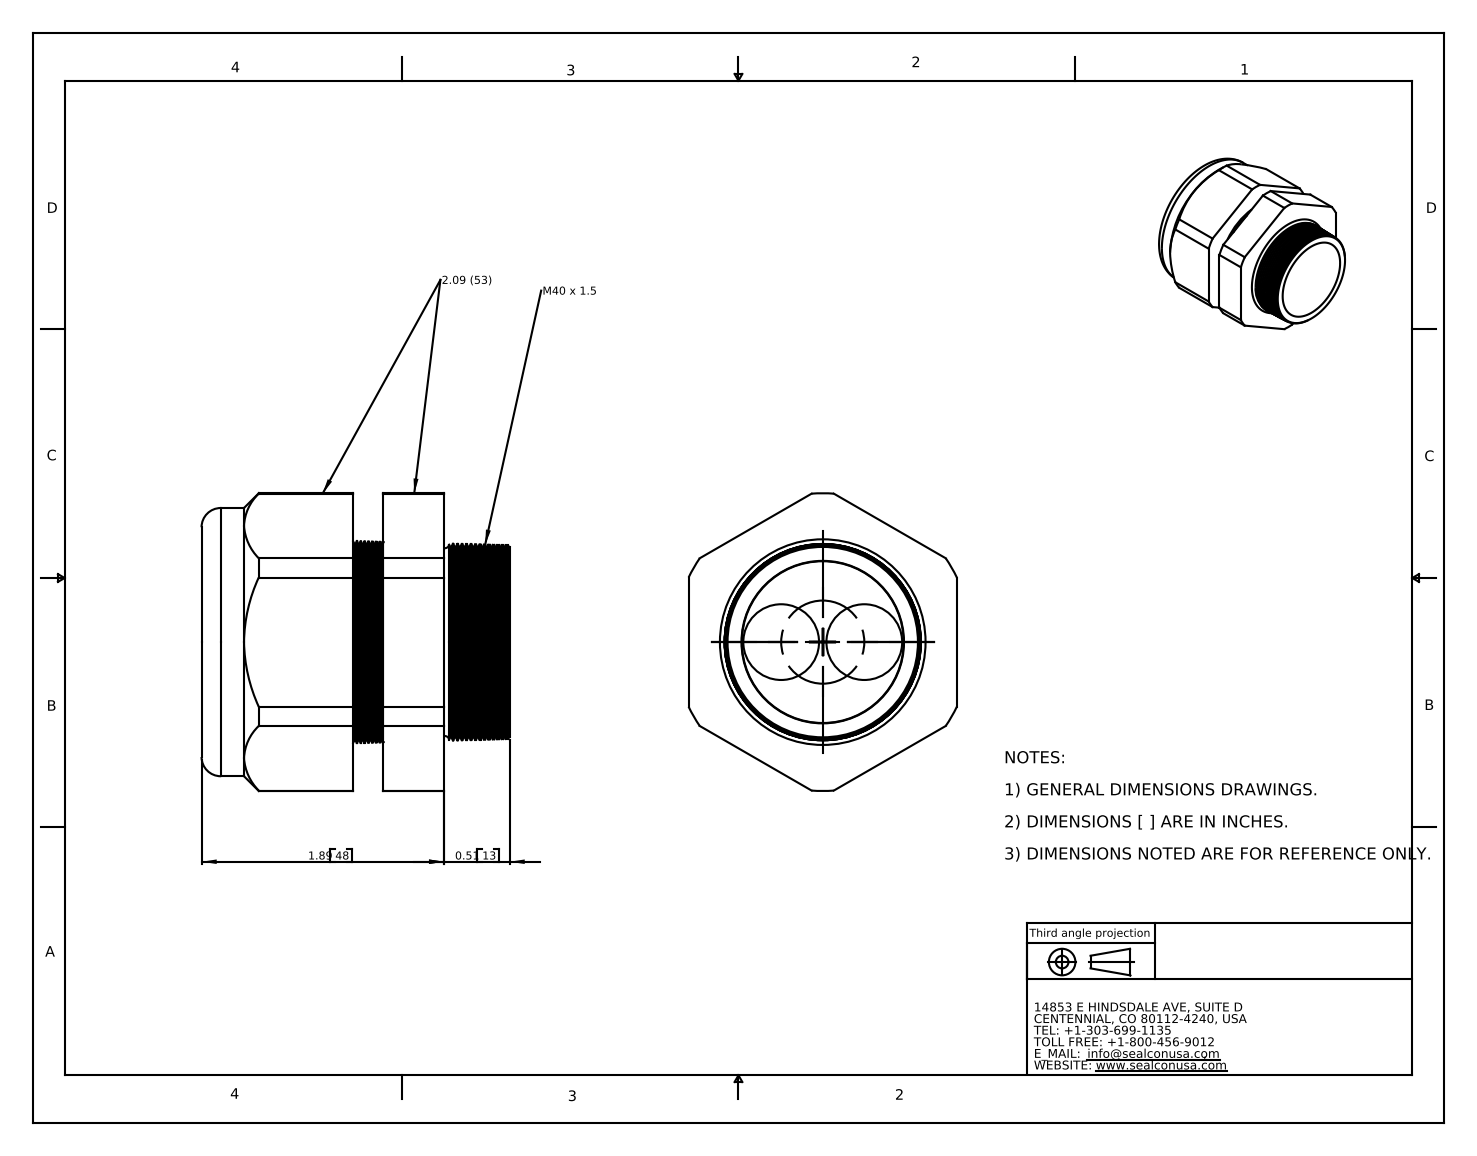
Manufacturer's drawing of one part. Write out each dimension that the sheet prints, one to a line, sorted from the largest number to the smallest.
1.89 48
0.51 13
